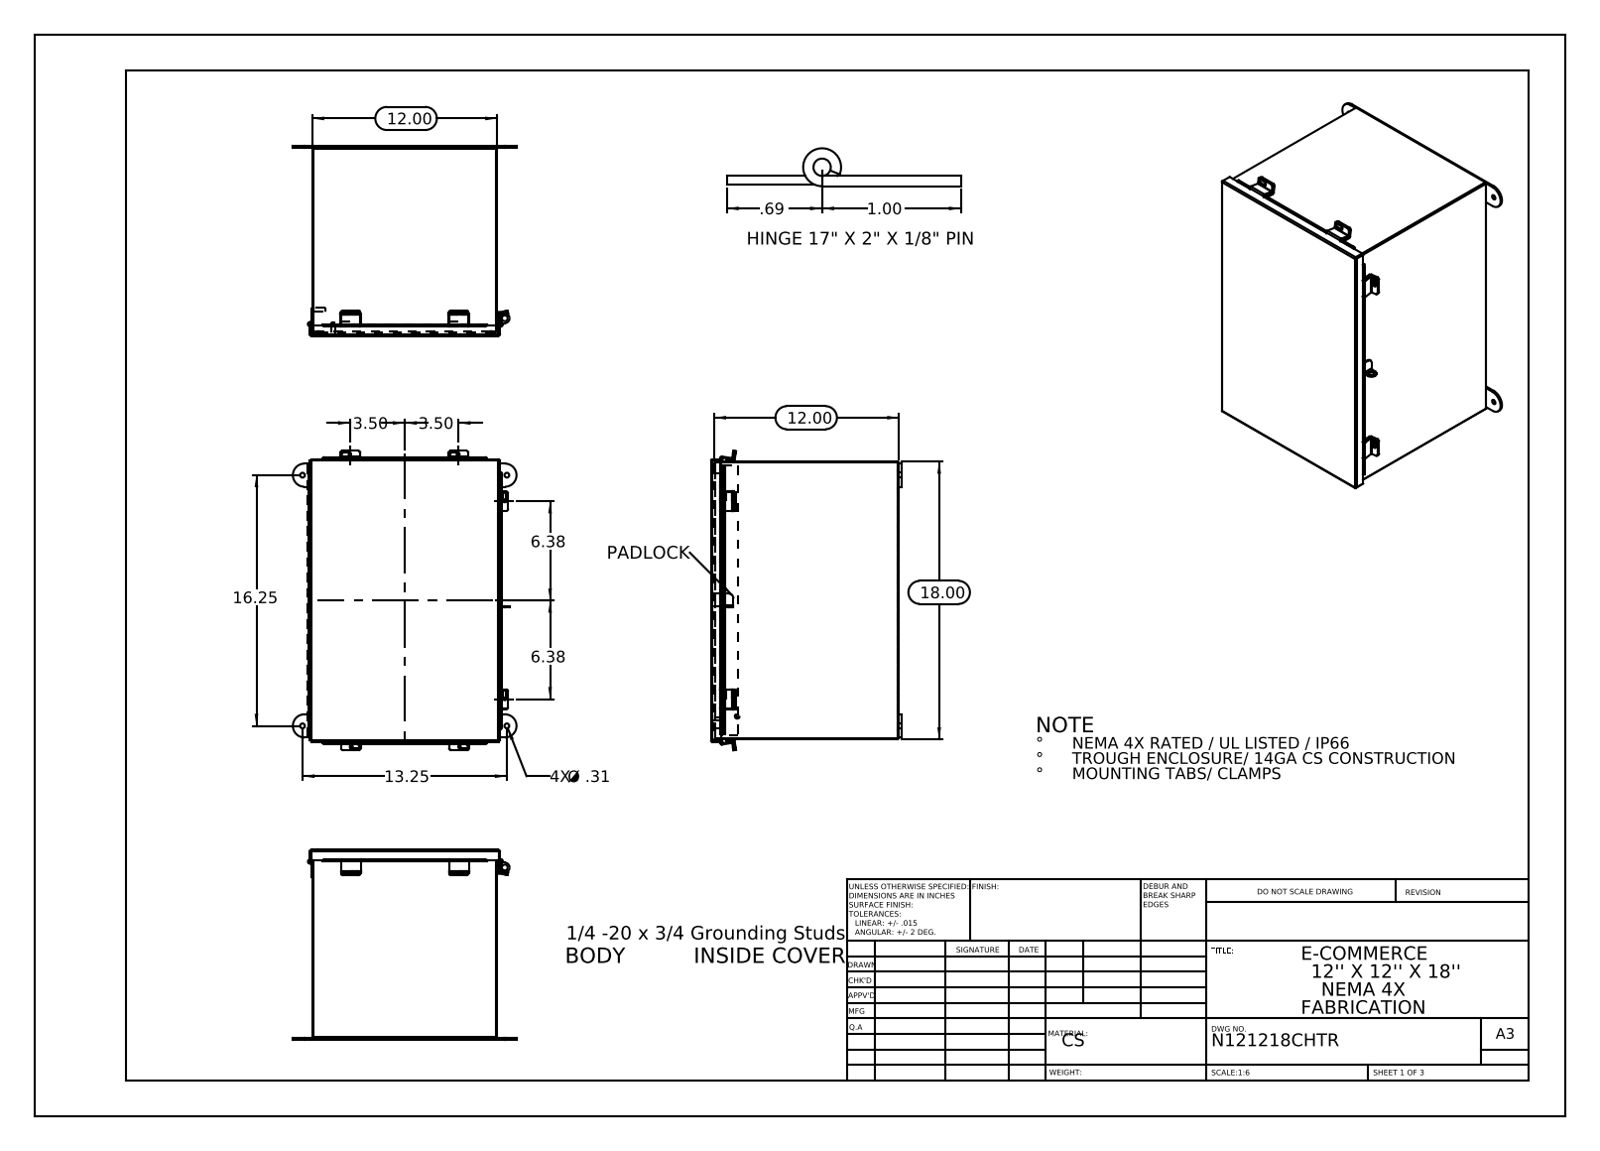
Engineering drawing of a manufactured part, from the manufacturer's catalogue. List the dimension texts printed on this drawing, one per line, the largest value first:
18.00
16.25
13.25
12.00
12.00
6.38
6.38
3.50
3.50
1.00
.69
4X Ø .31
